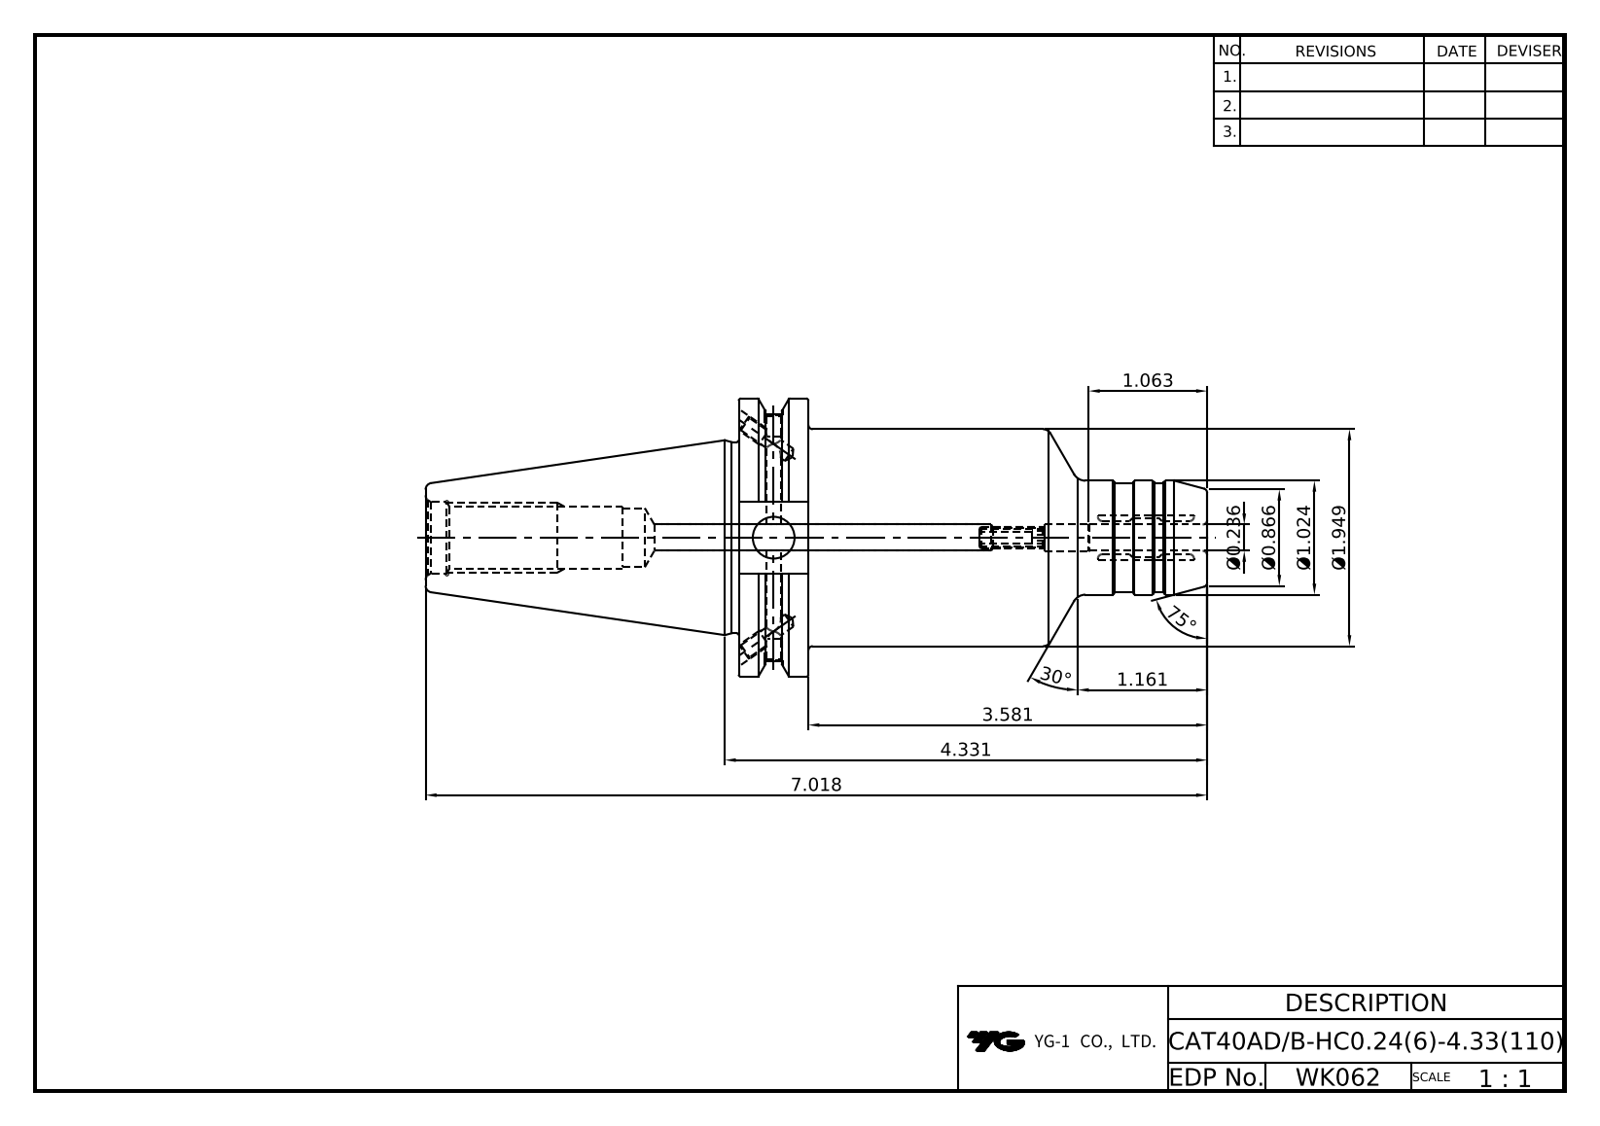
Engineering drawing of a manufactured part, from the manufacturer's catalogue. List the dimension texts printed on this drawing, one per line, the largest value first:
75°
30°
7.018
4.331
3.581
Ø1.949
1.161
1.063
Ø1.024
Ø0.866
Ø0.236
